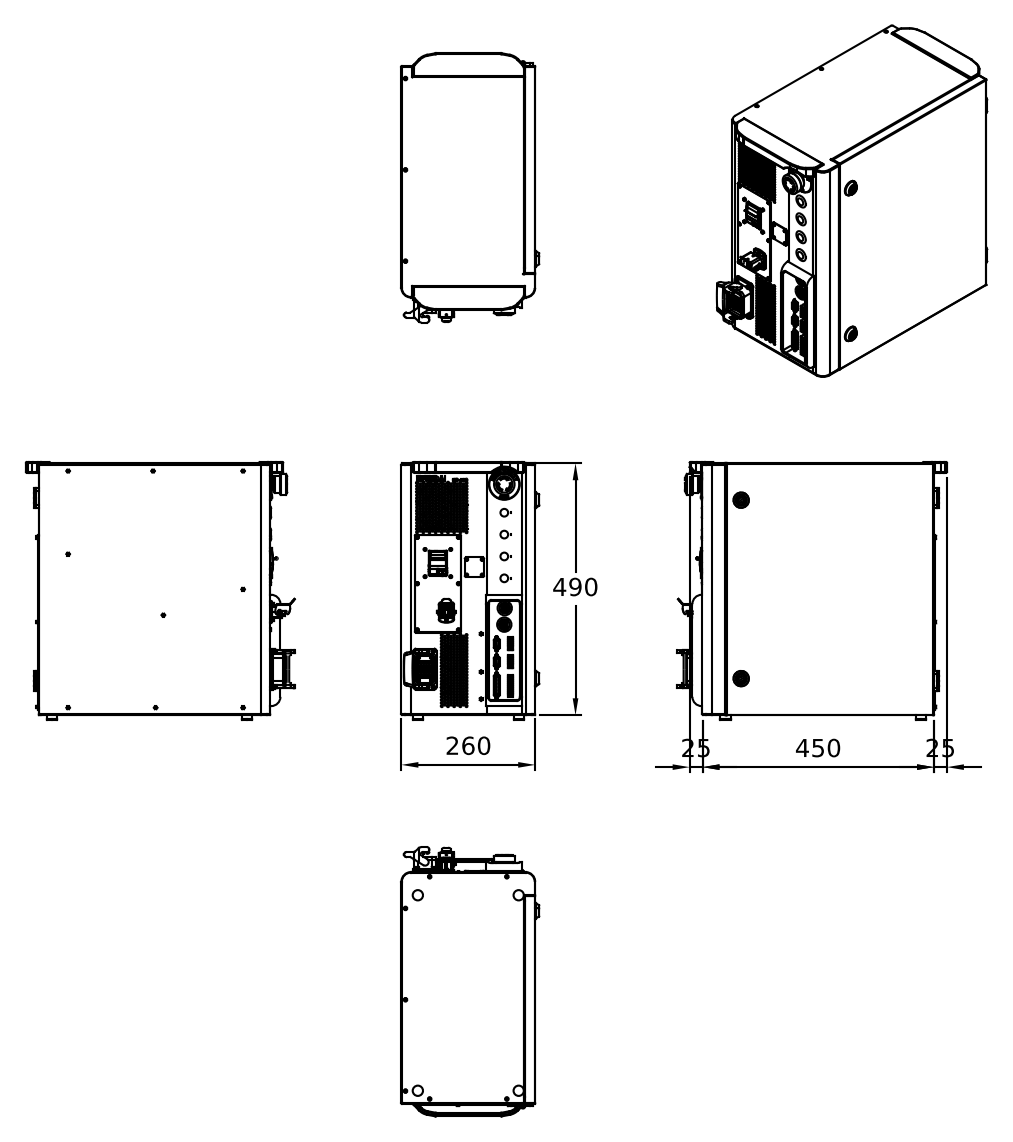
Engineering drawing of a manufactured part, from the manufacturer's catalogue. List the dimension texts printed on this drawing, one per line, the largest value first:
490
450
260
25
25
